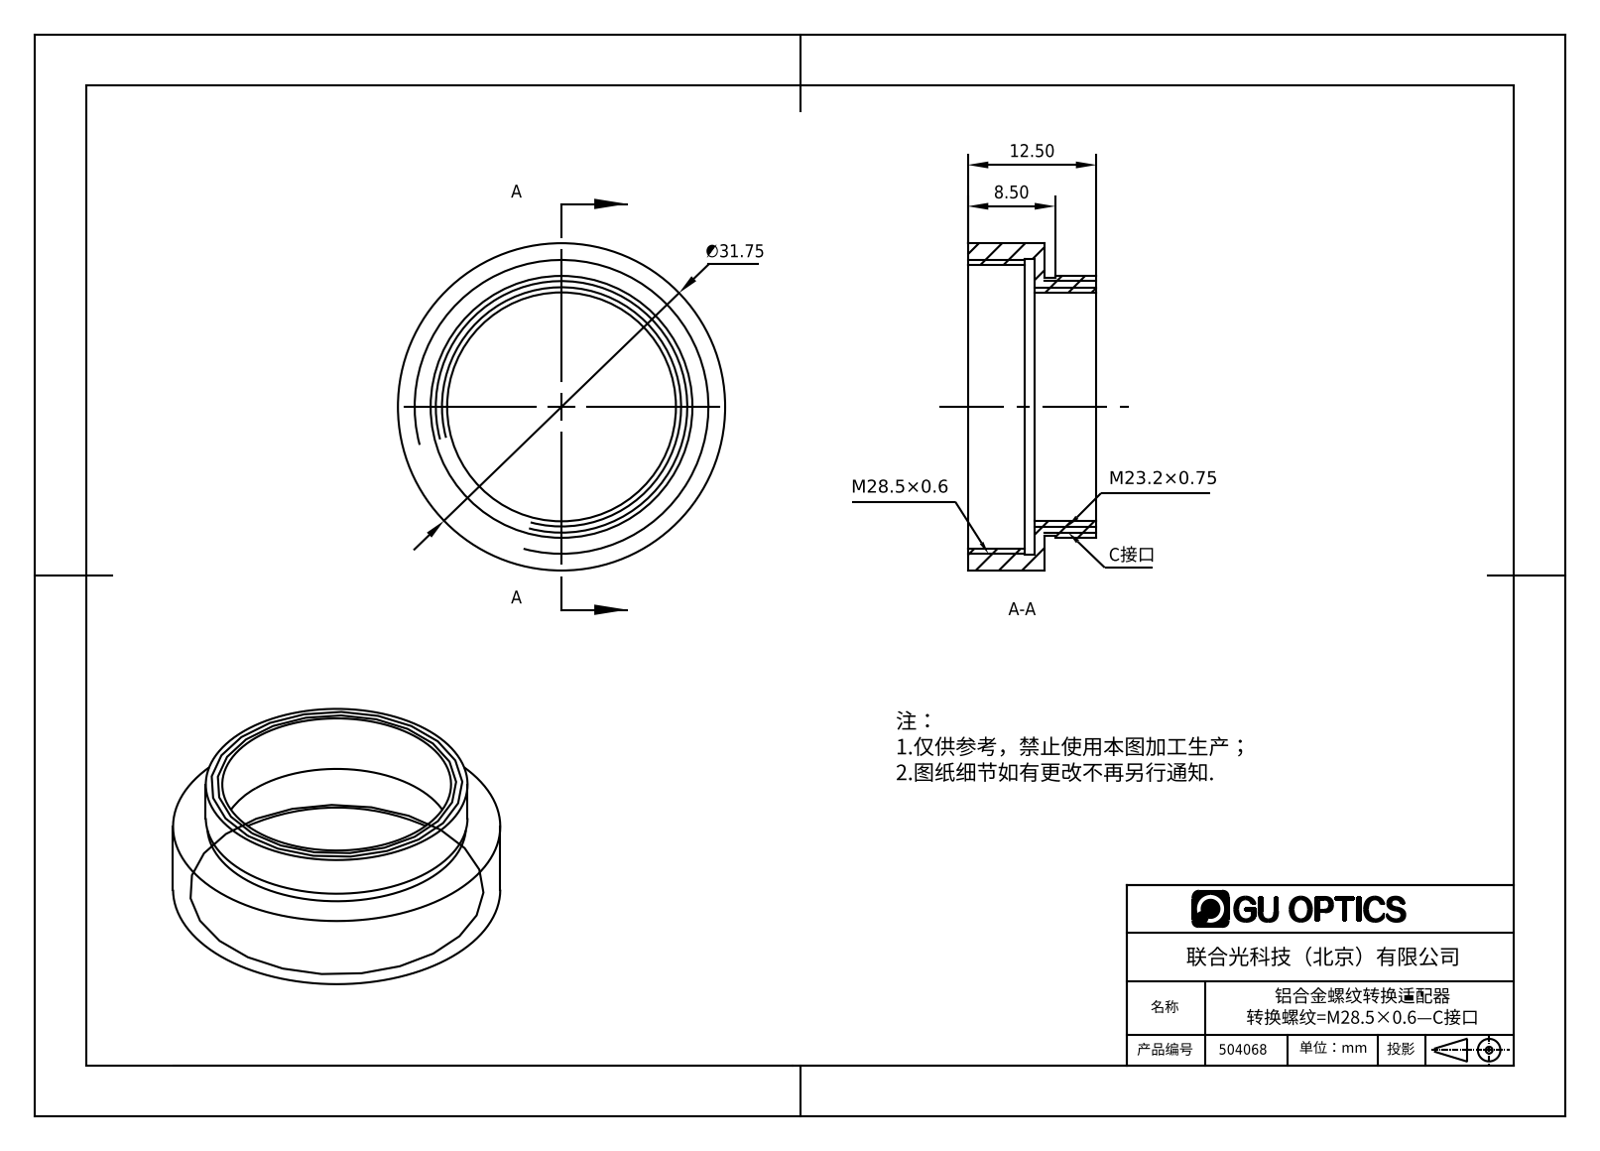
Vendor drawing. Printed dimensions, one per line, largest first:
∅31.75
12.50
8.50
